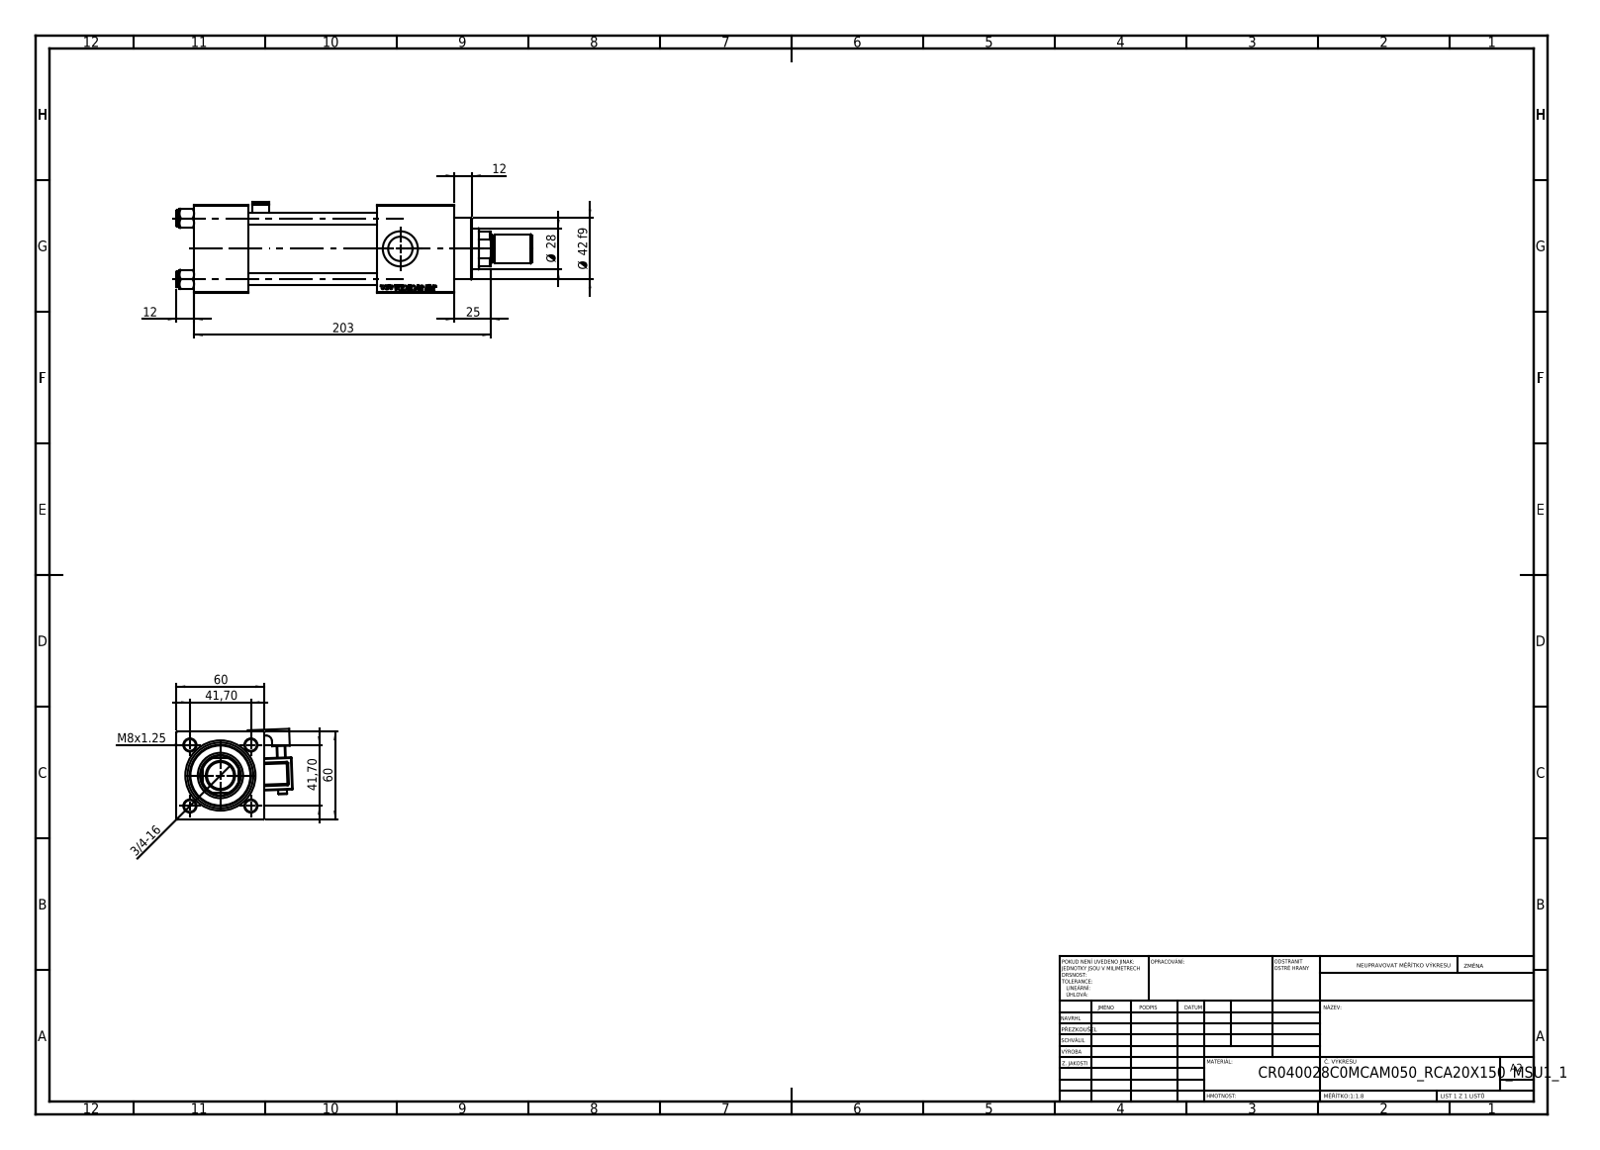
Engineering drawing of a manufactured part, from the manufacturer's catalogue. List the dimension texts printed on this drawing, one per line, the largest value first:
203
60
60
Ø 42 f9
41,70
41,70
Ø 28
25
12
12
M8x1.25
3/4-16
